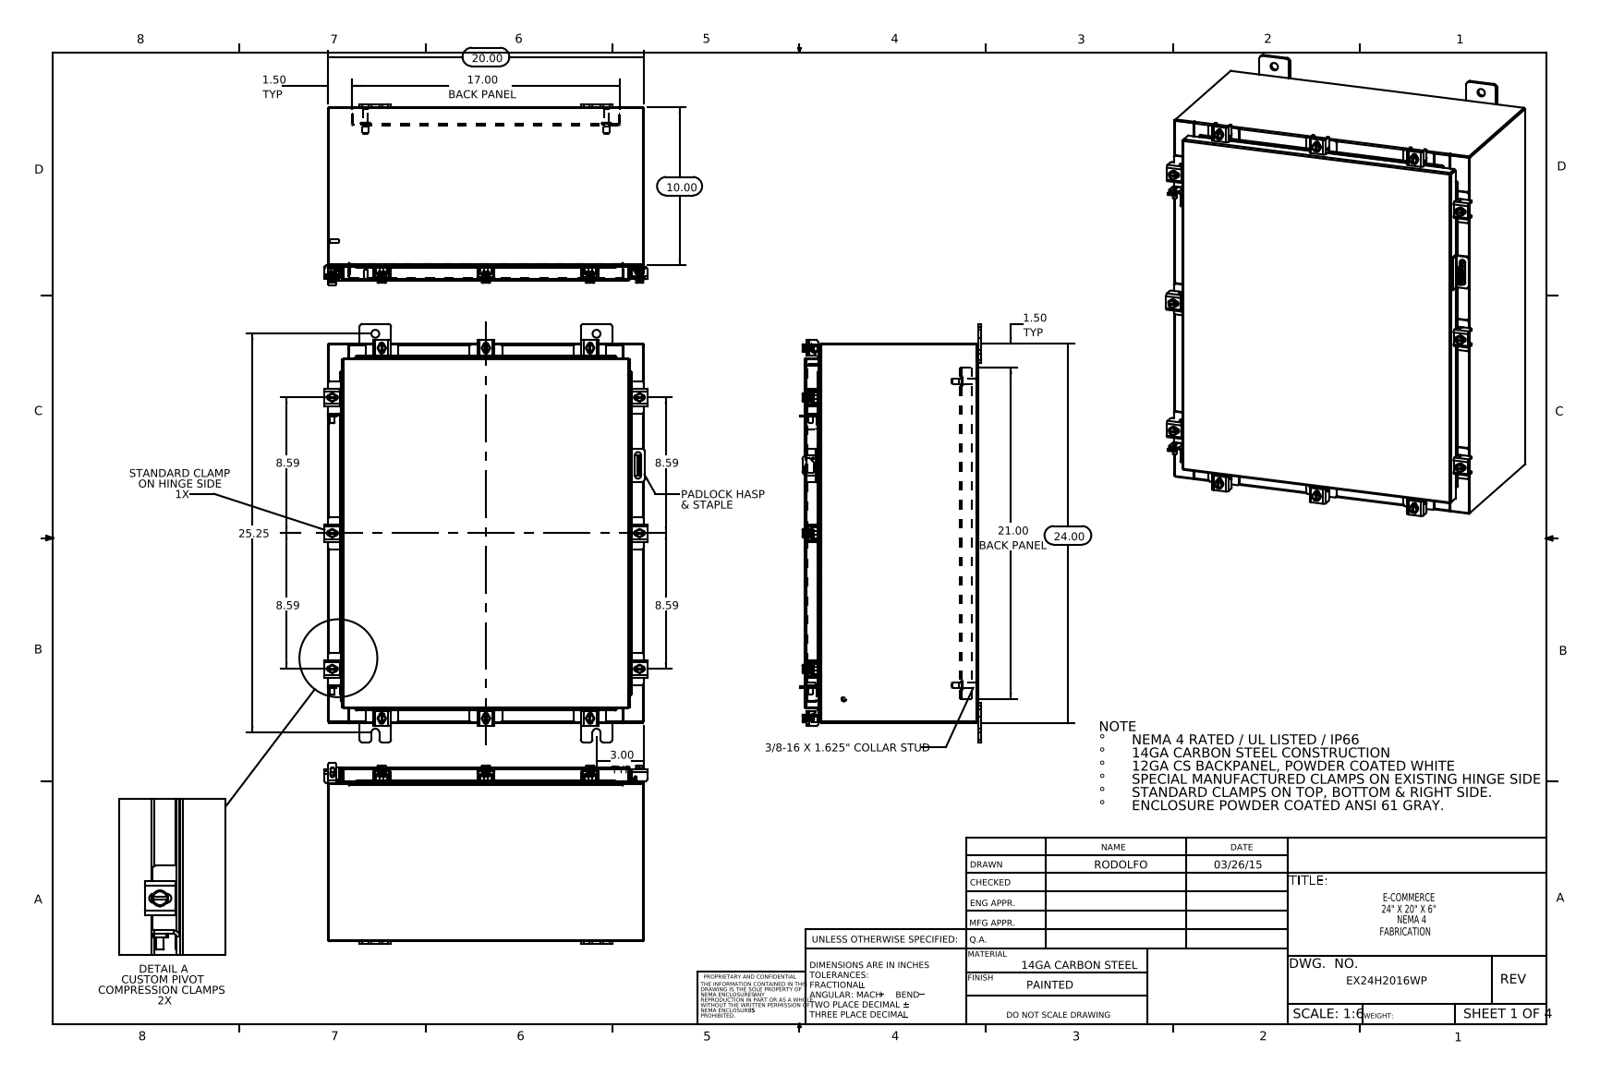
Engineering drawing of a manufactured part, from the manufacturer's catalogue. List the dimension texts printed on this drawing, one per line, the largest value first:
25.25
24.00
21.00 BACK PANEL
20.00
17.00 BACK PANEL
10.00
8.59
8.59
8.59
8.59
3.00 TYP
1.50 TYP
1.50 TYP
